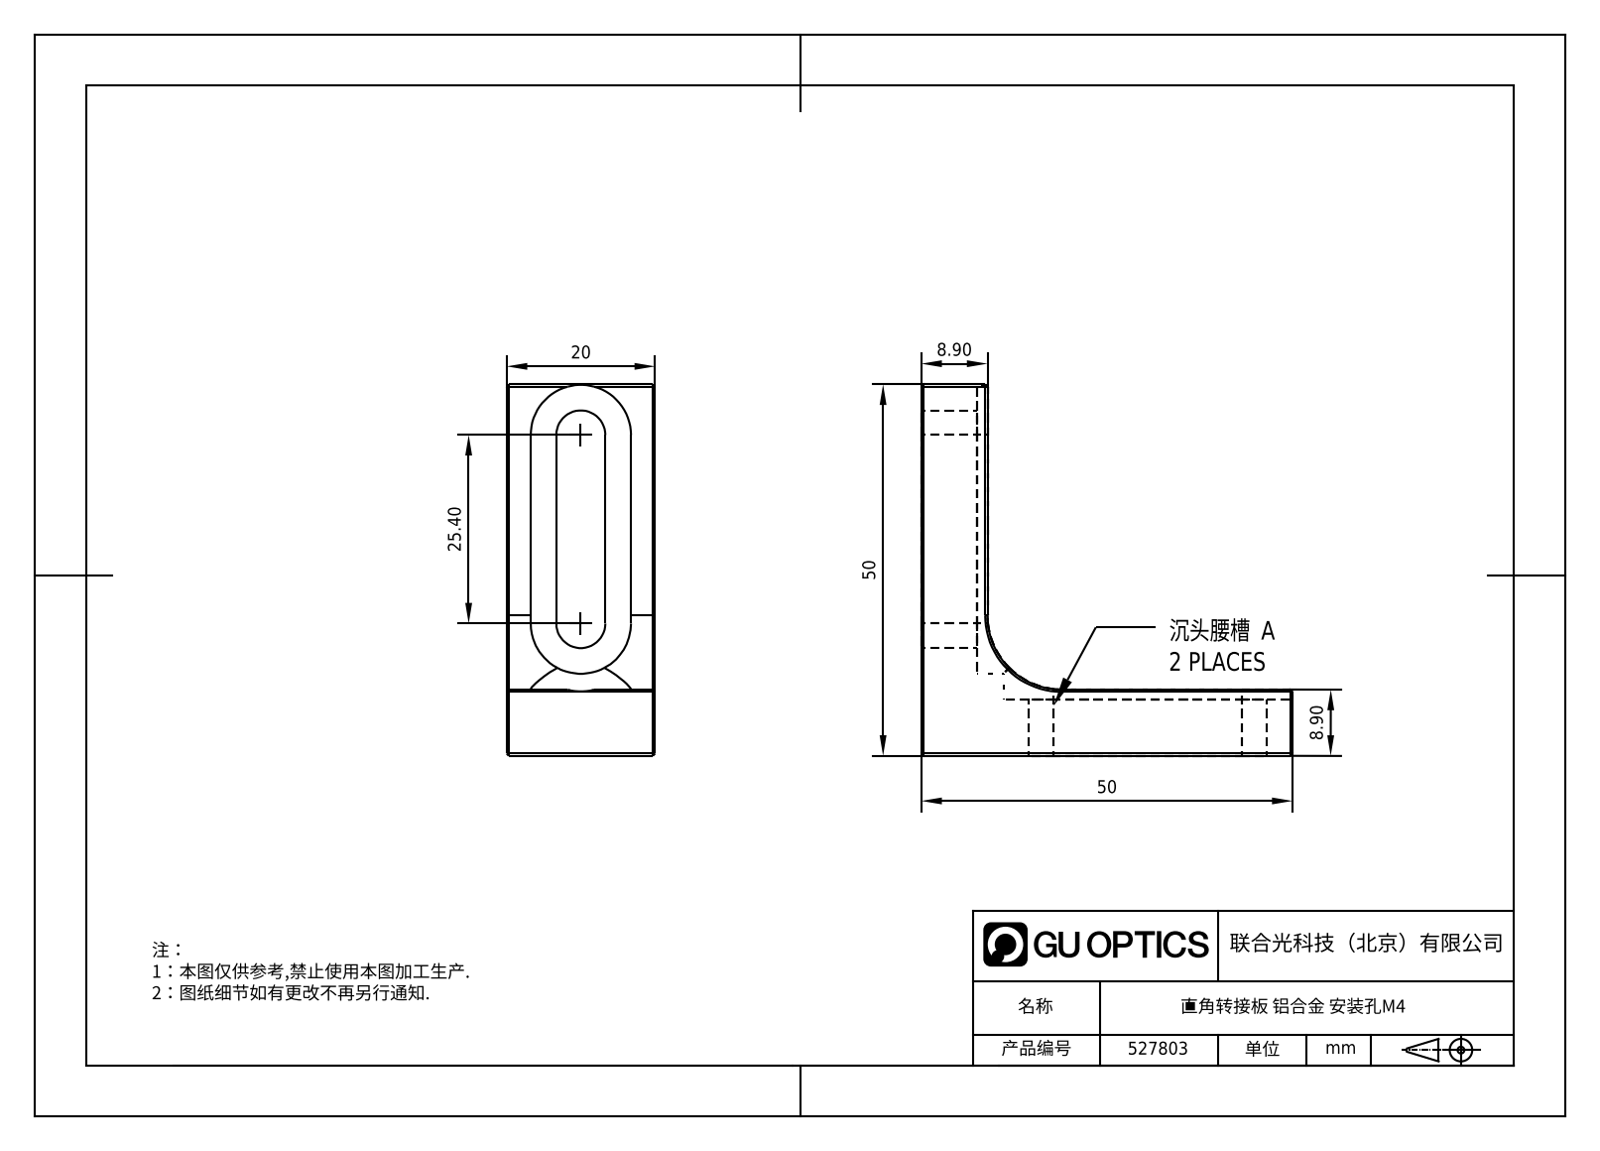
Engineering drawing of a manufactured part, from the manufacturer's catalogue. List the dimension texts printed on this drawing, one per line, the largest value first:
50
50
25.40
20
8.90
8.90
